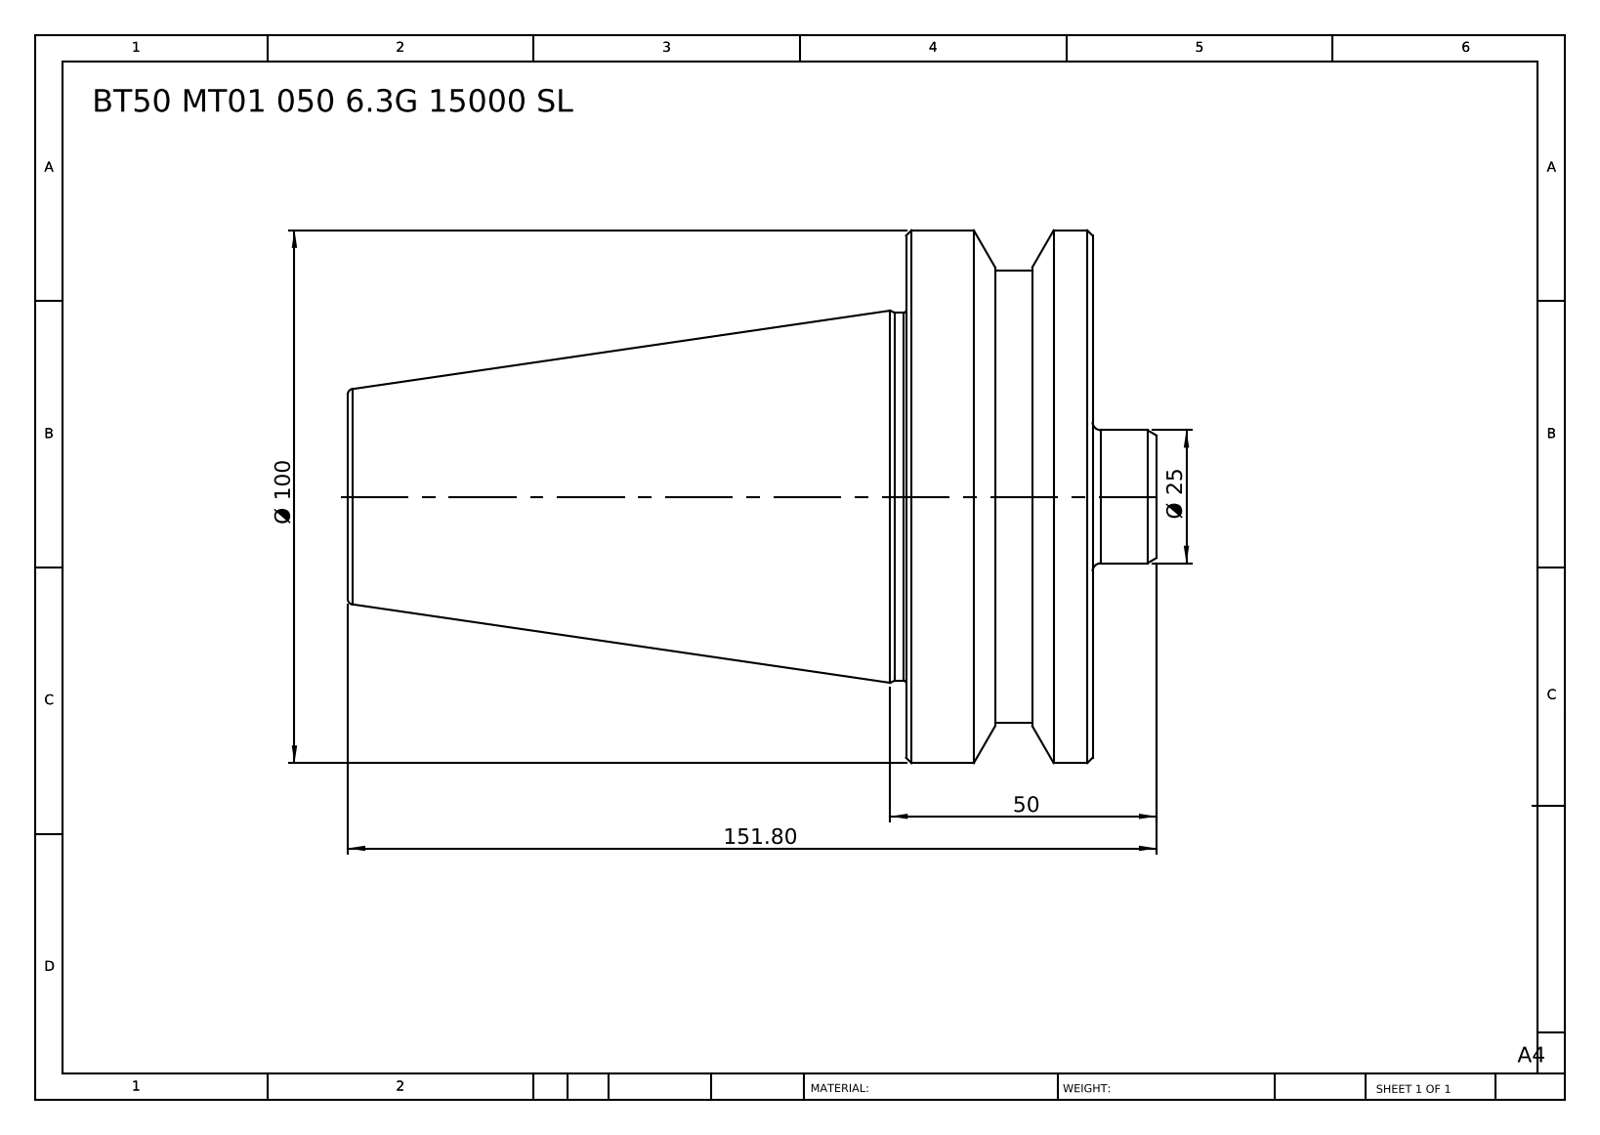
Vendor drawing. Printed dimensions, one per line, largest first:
151.80
Ø 100
50
Ø 25
